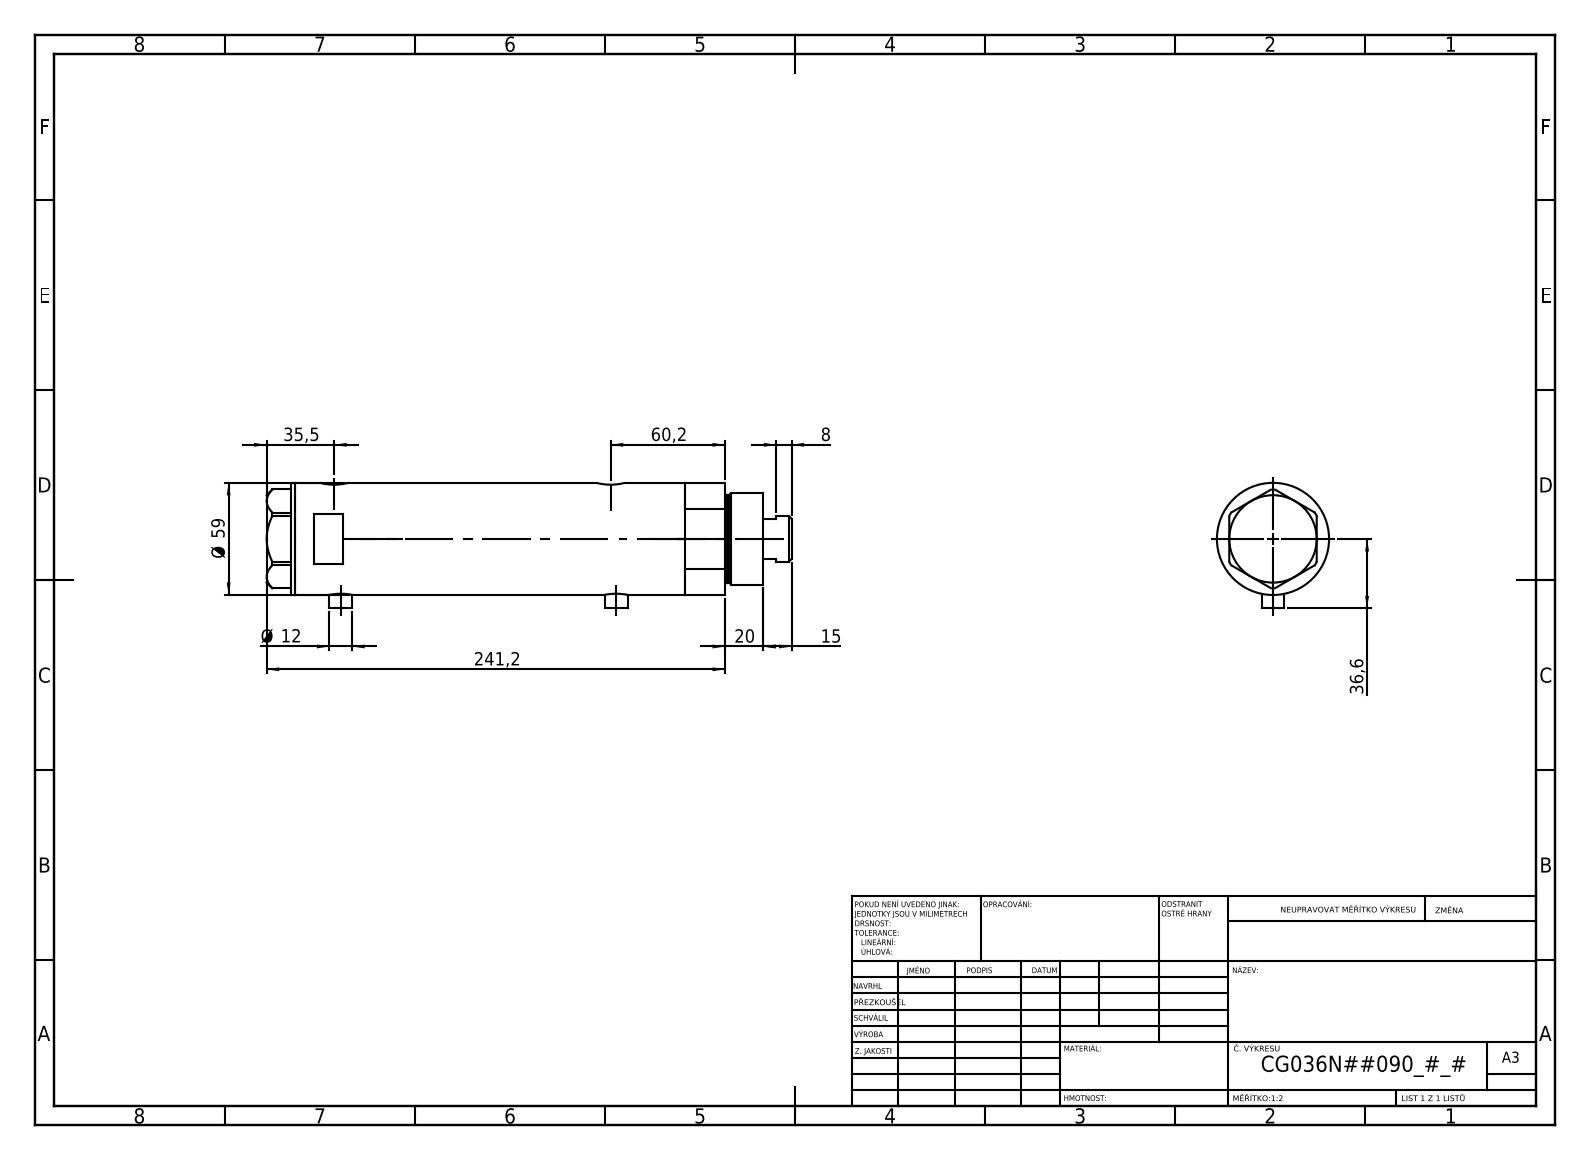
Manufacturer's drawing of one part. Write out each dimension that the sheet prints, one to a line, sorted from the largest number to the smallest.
241,2
60,2
Ø 59
36,6
35,5
20
15
Ø 12
8
